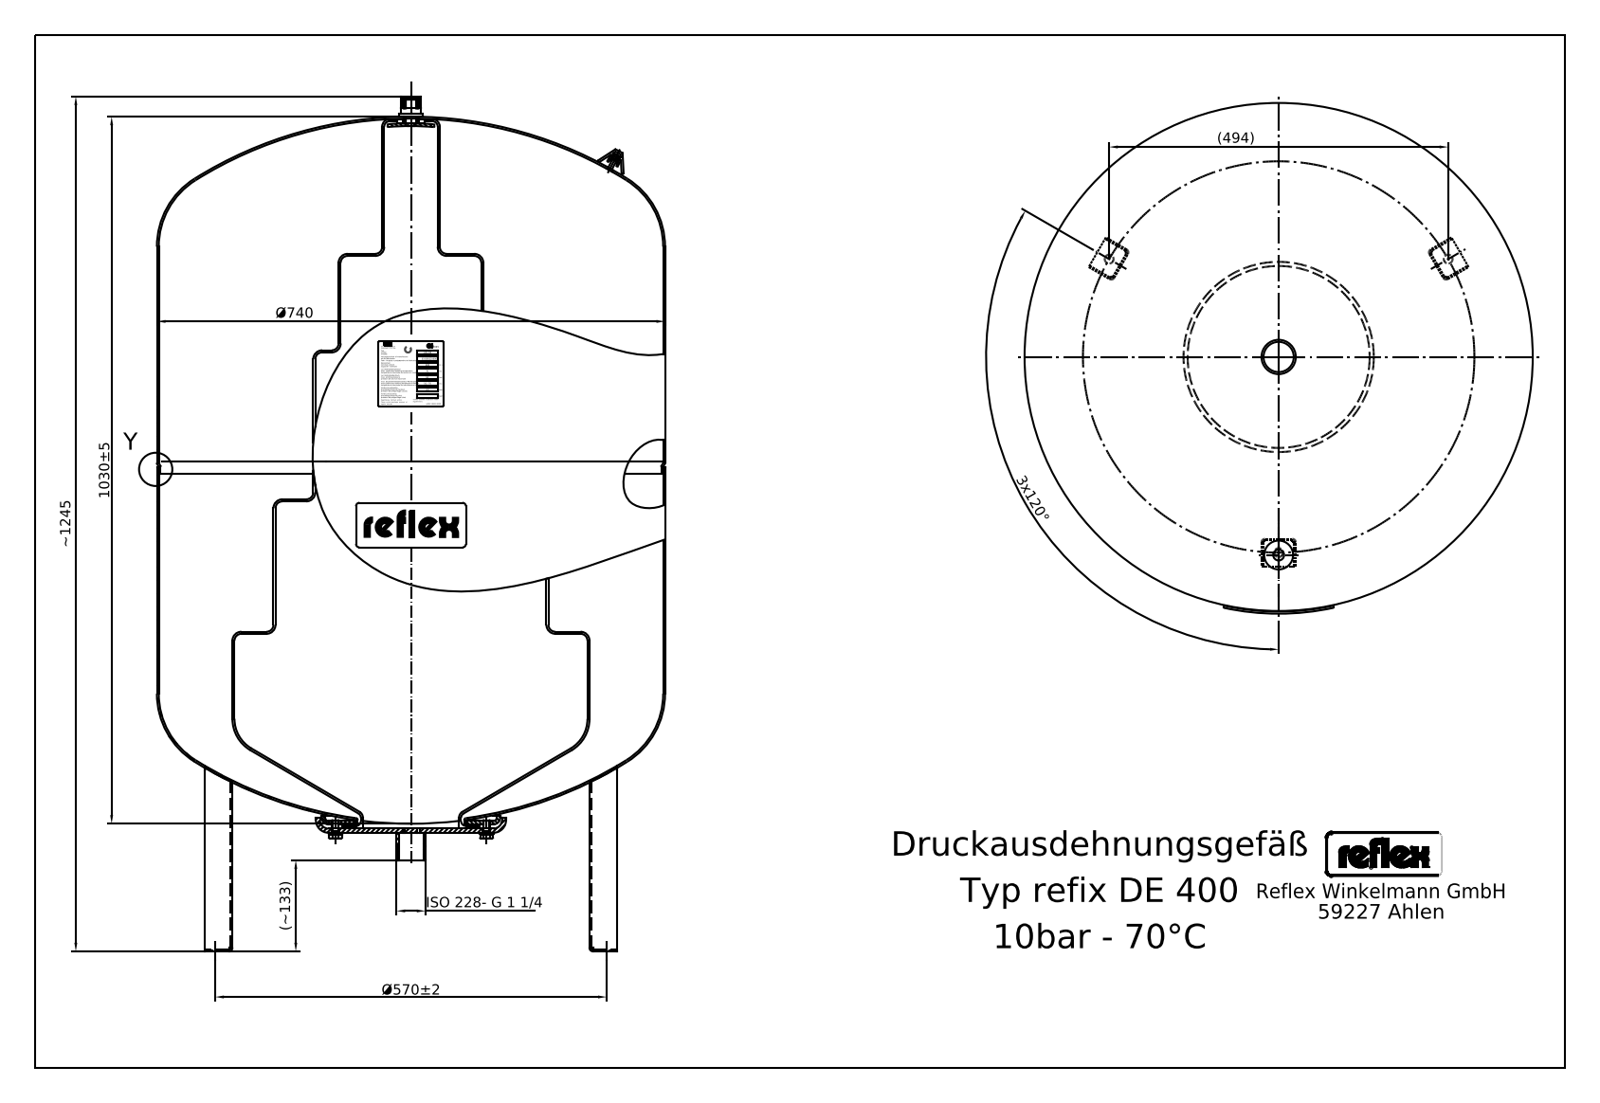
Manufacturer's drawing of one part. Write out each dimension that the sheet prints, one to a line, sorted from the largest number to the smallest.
~1245
1030±5
Ø740
Ø570±2
(494)
ISO 228- G 1 1/4
(~133)
3x120°
